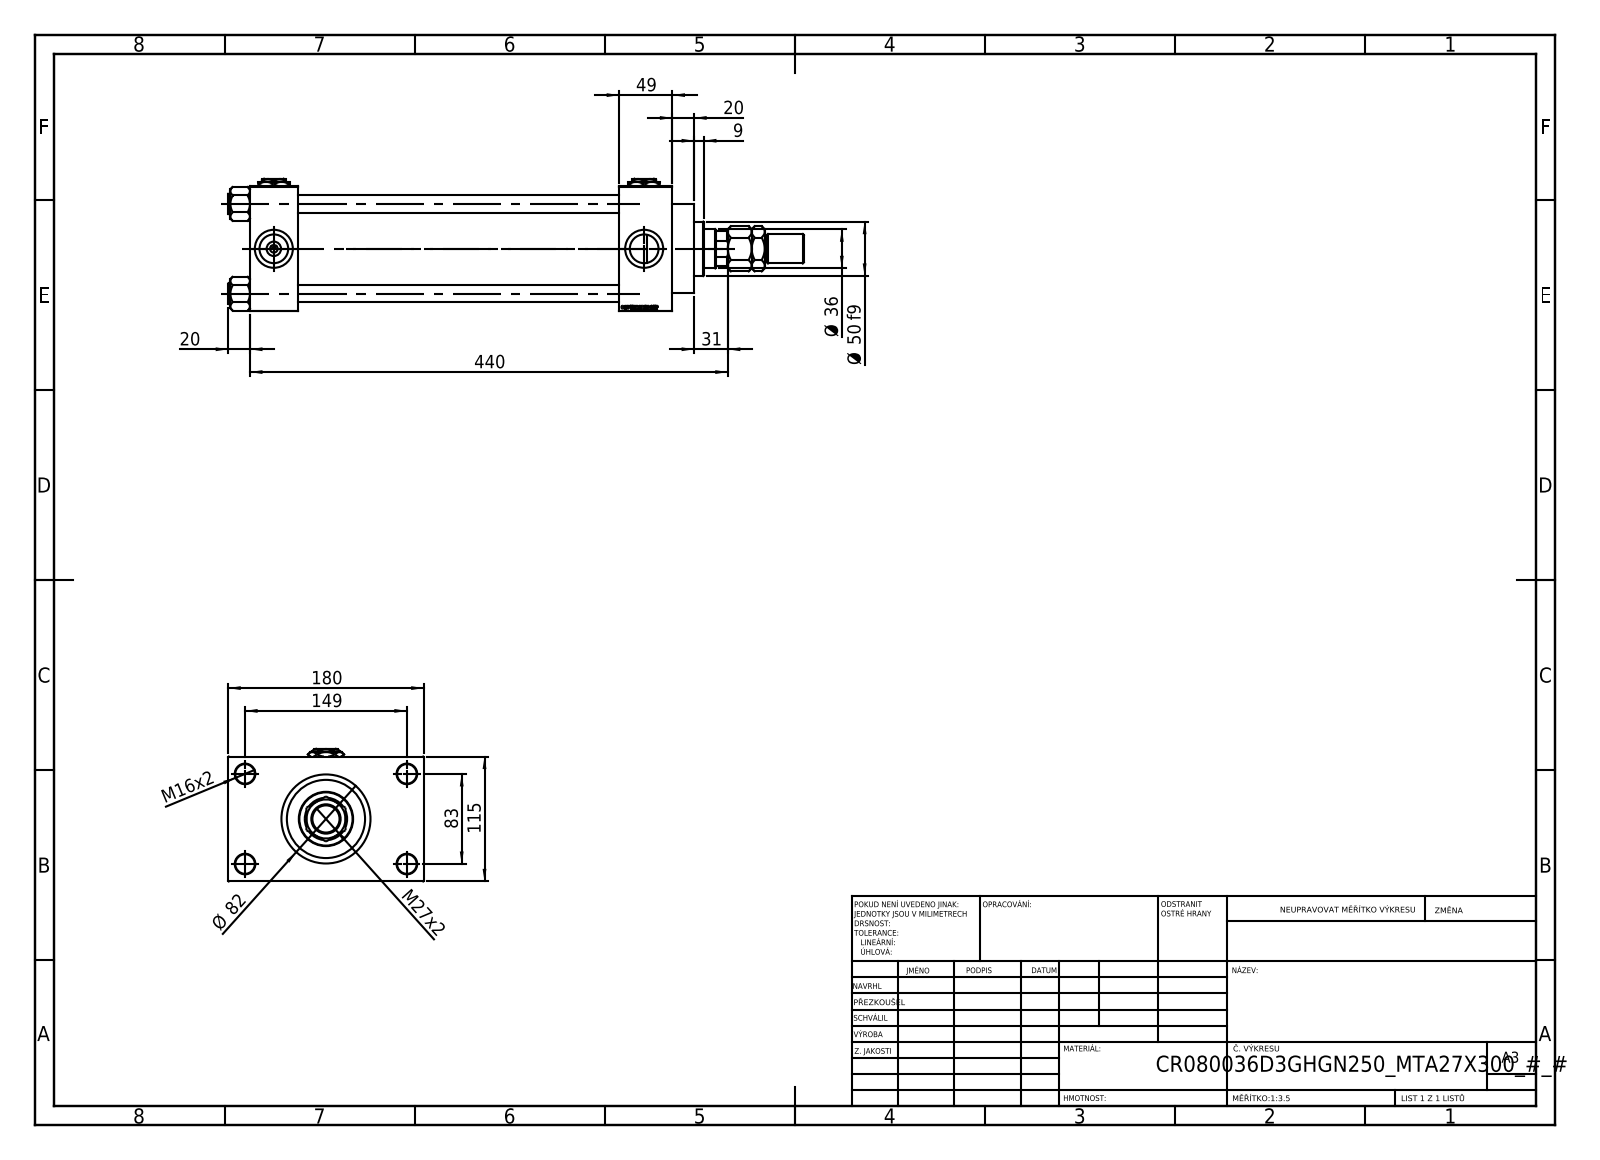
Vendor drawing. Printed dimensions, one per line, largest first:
440
180
149
115
83
Ø 82
Ø 50 f9
49
Ø 36
31
M27x2
20
20
M16x2
9
